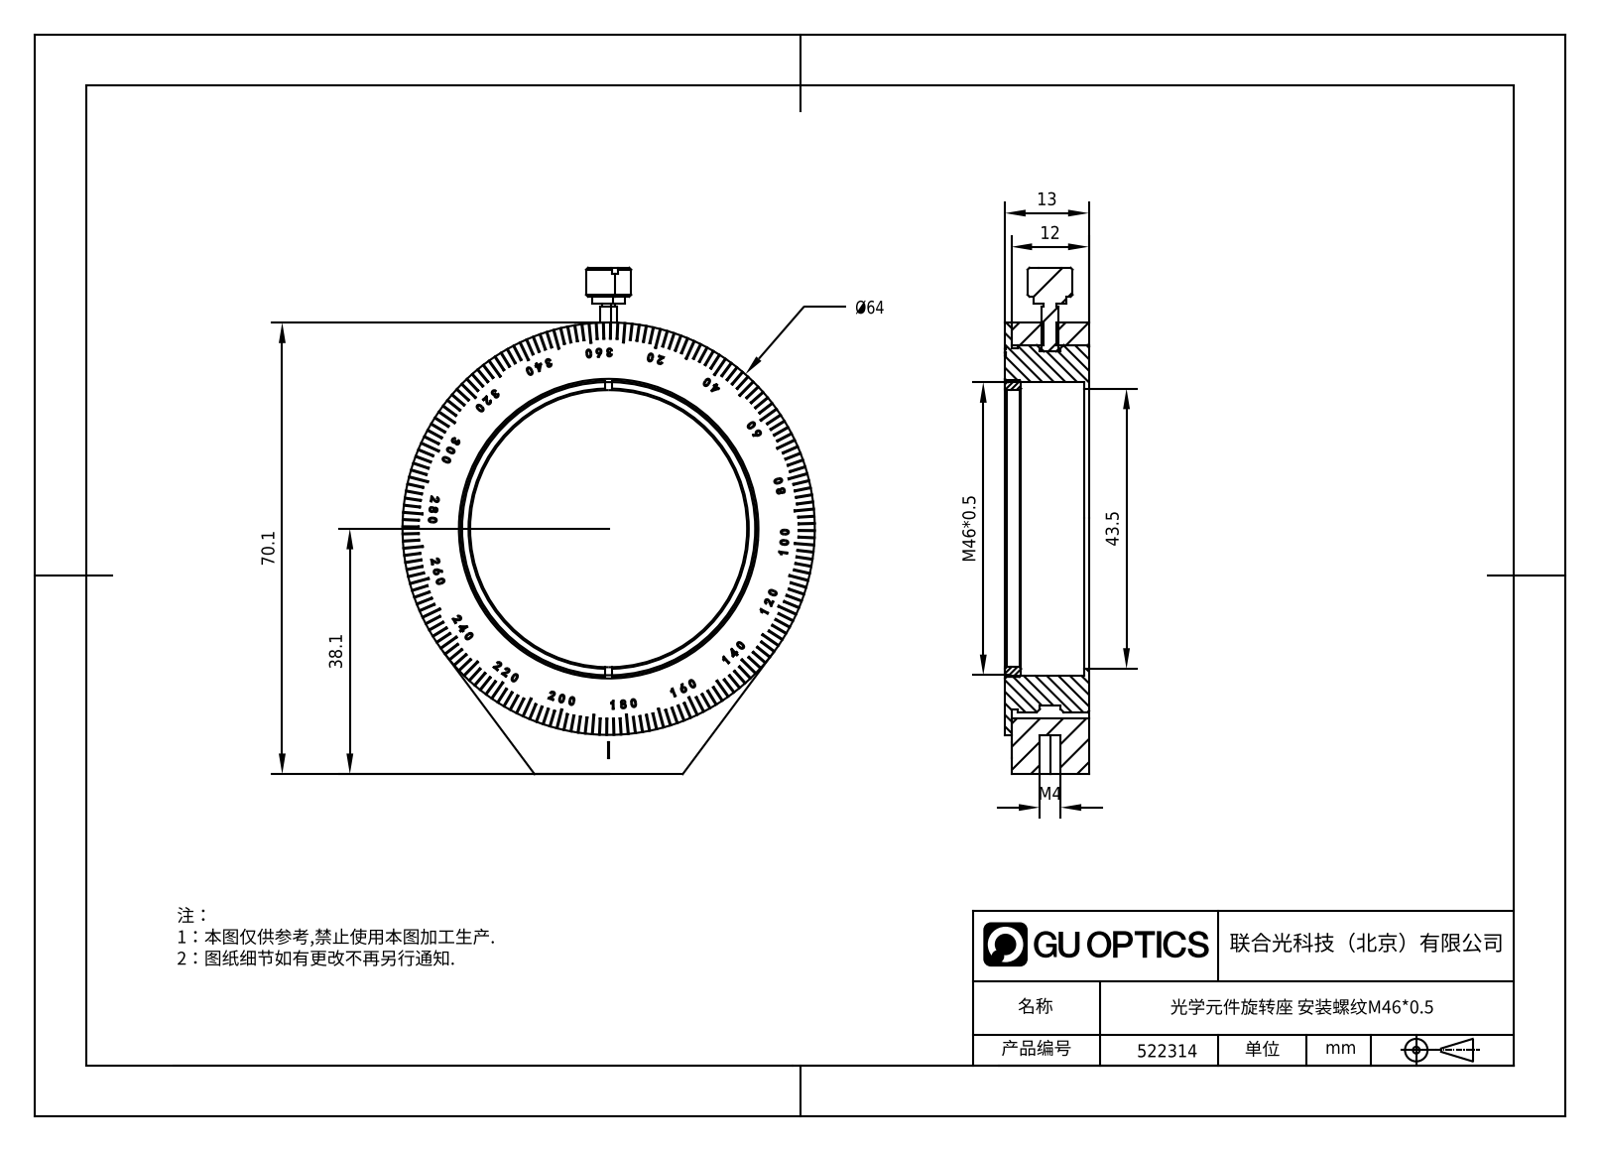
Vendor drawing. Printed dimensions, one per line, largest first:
70.1
M46*0.5
43.5
38.1
13
12
M4
